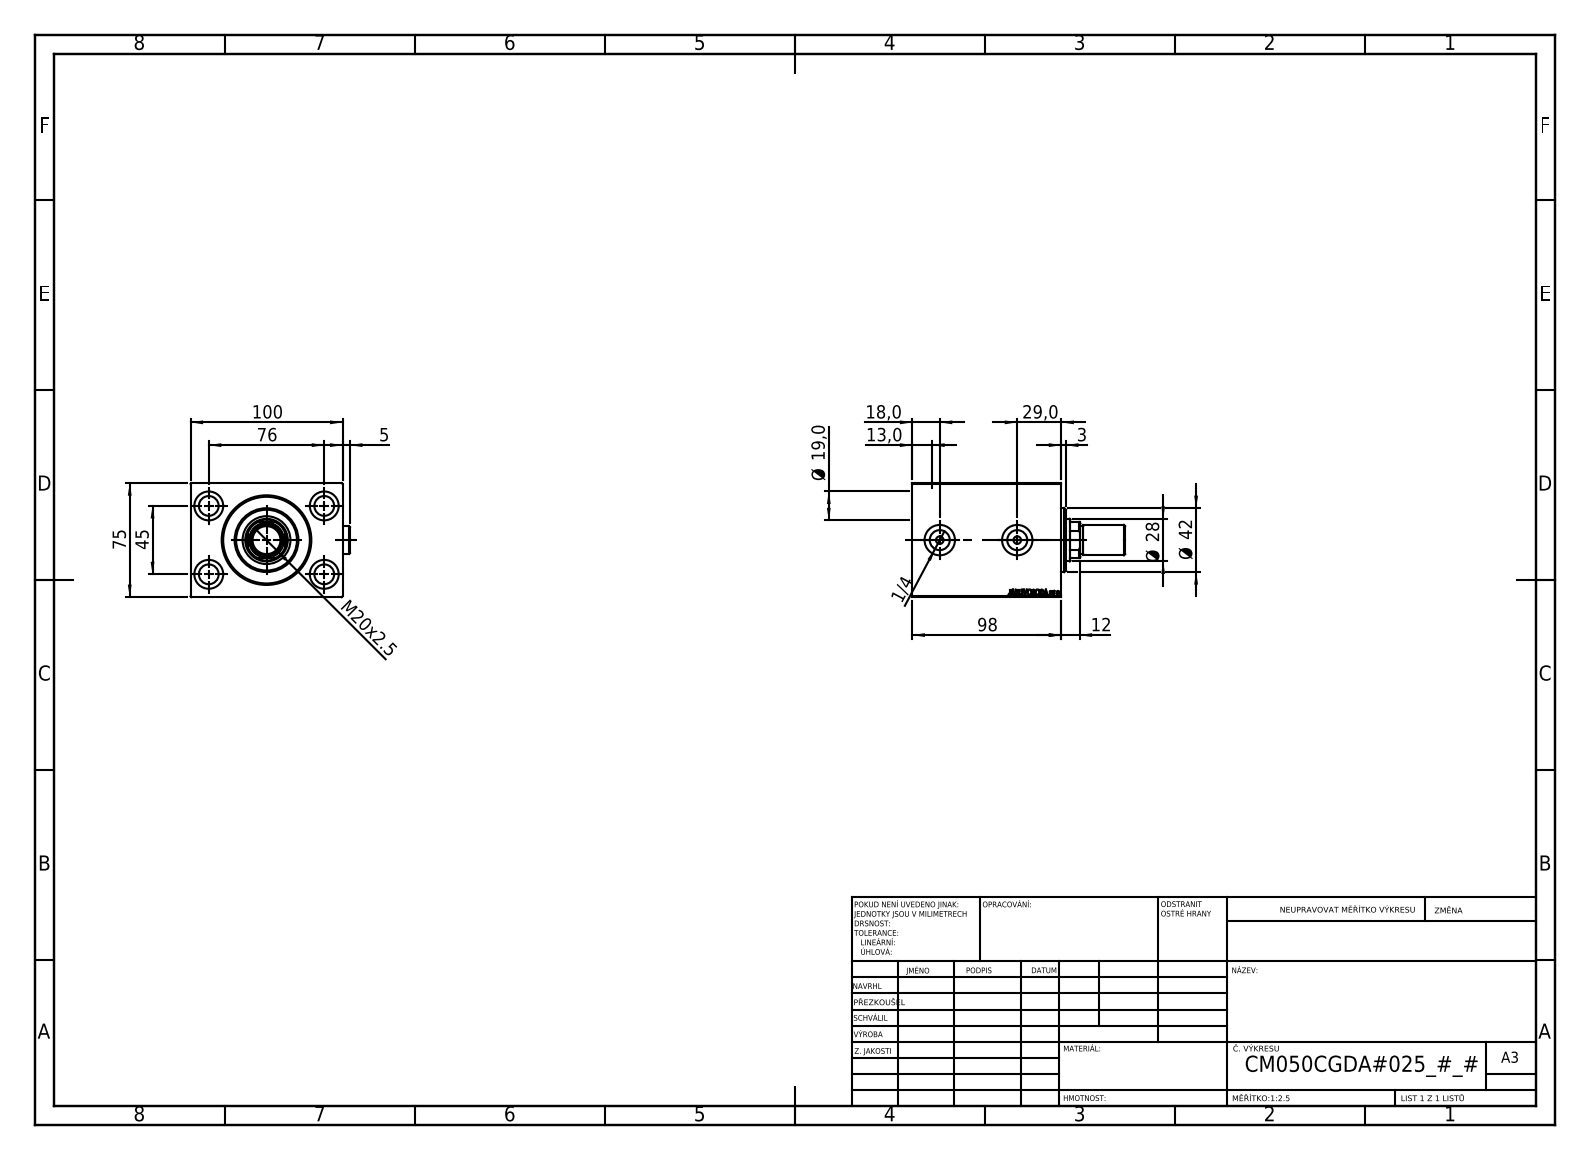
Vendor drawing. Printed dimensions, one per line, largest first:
100
98
76
75
45
Ø 42
29,0
Ø 28
M20x2.5
Ø 19,0
18,0
13,0
12
5
3
1/4
